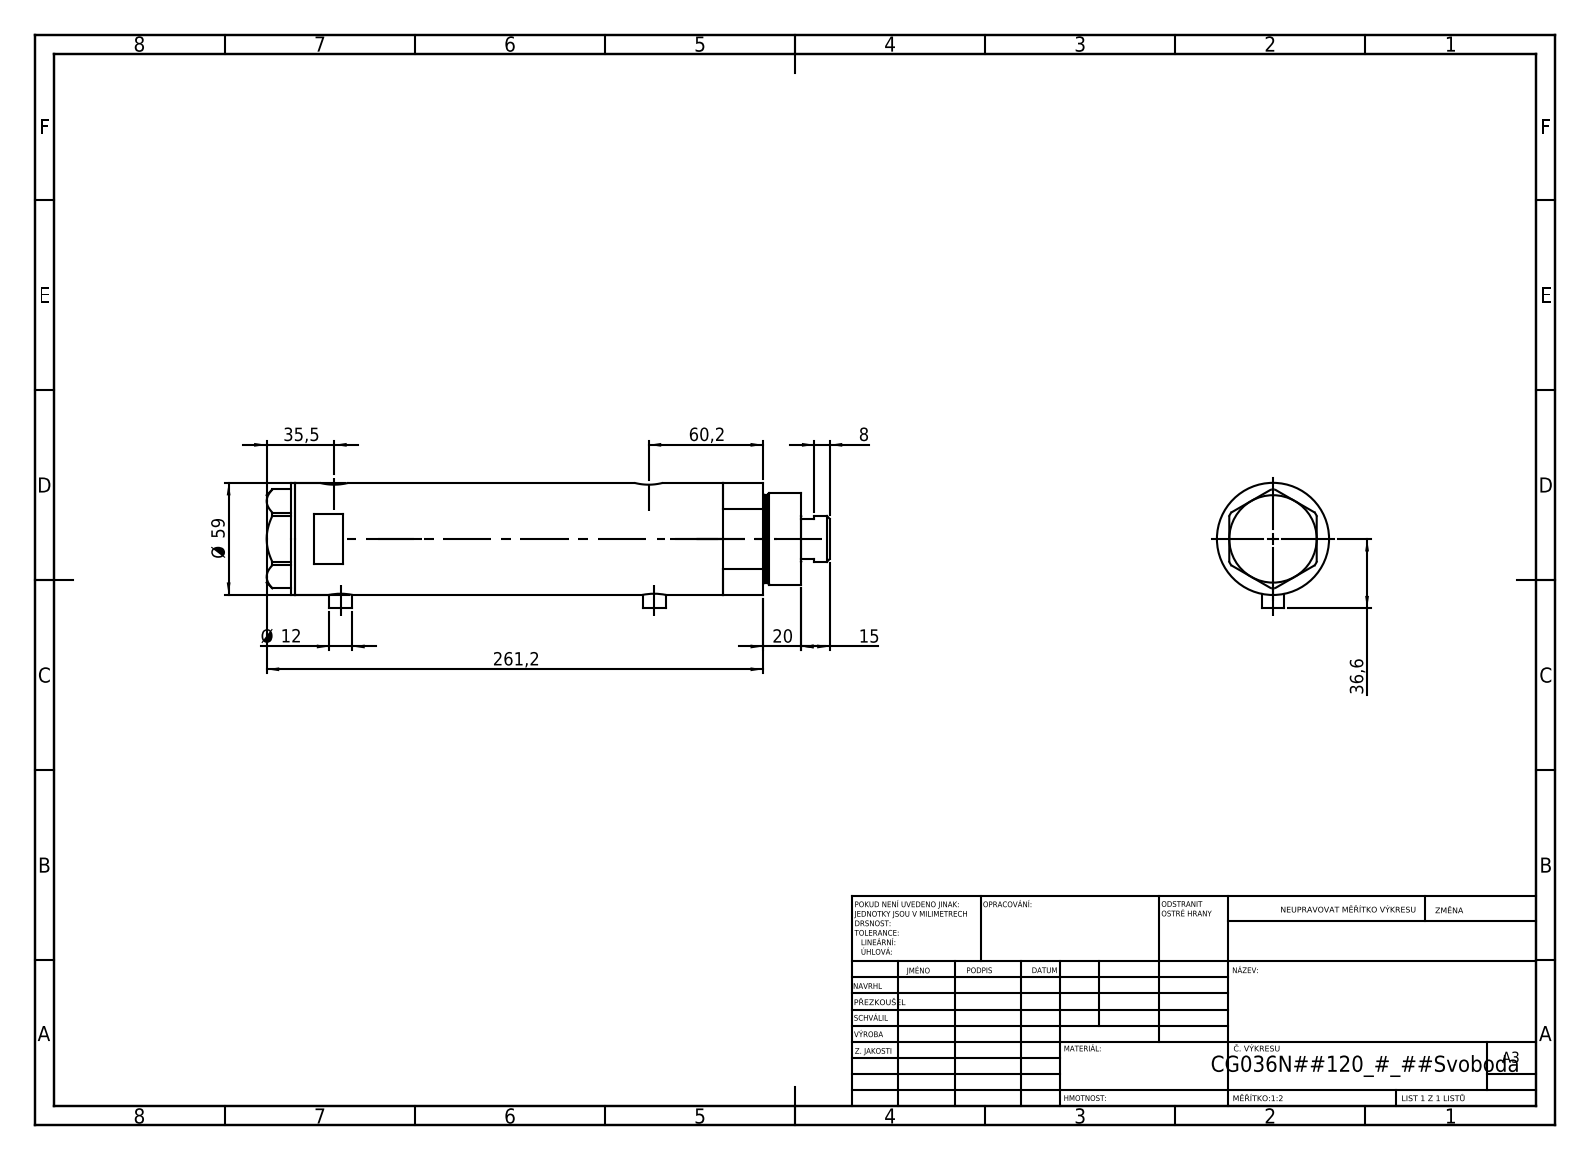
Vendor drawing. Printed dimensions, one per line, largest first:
261,2
60,2
Ø 59
36,6
35,5
20
15
Ø 12
8
